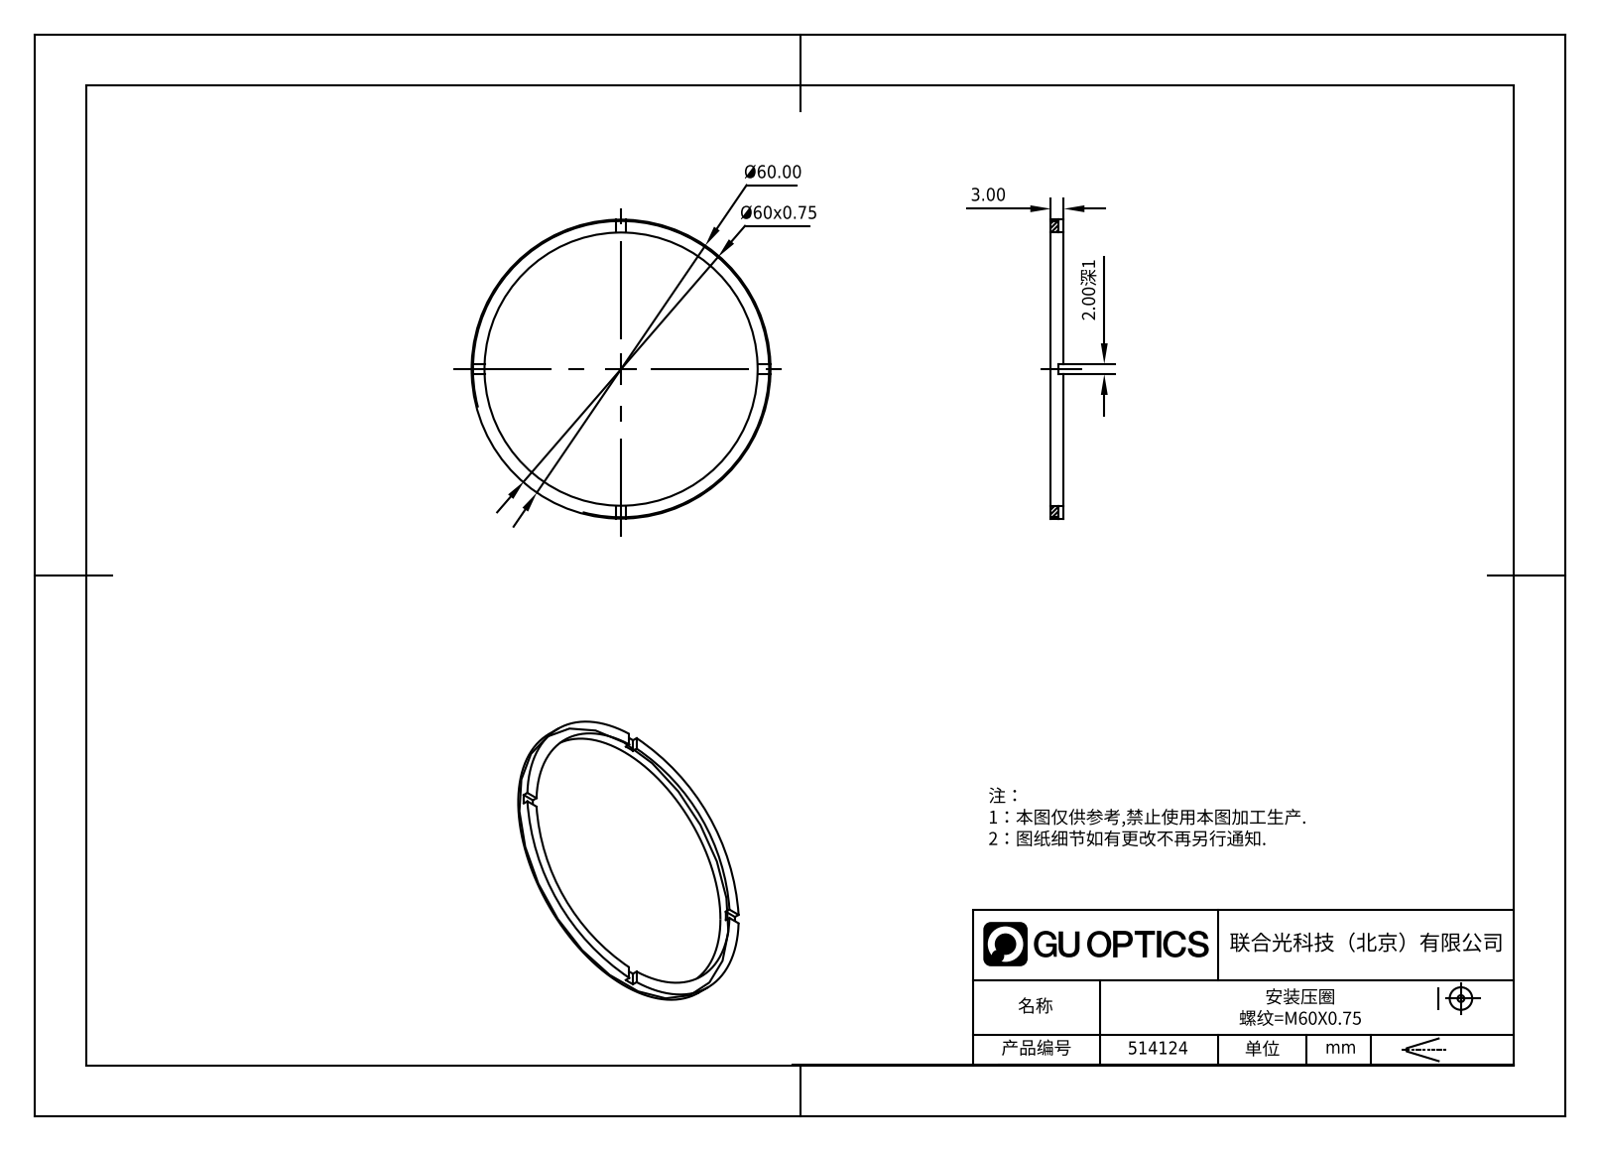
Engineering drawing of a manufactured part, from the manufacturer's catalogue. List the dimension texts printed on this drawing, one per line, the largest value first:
Ø60.00
Ø60x0.75
3.00
2.00深1
